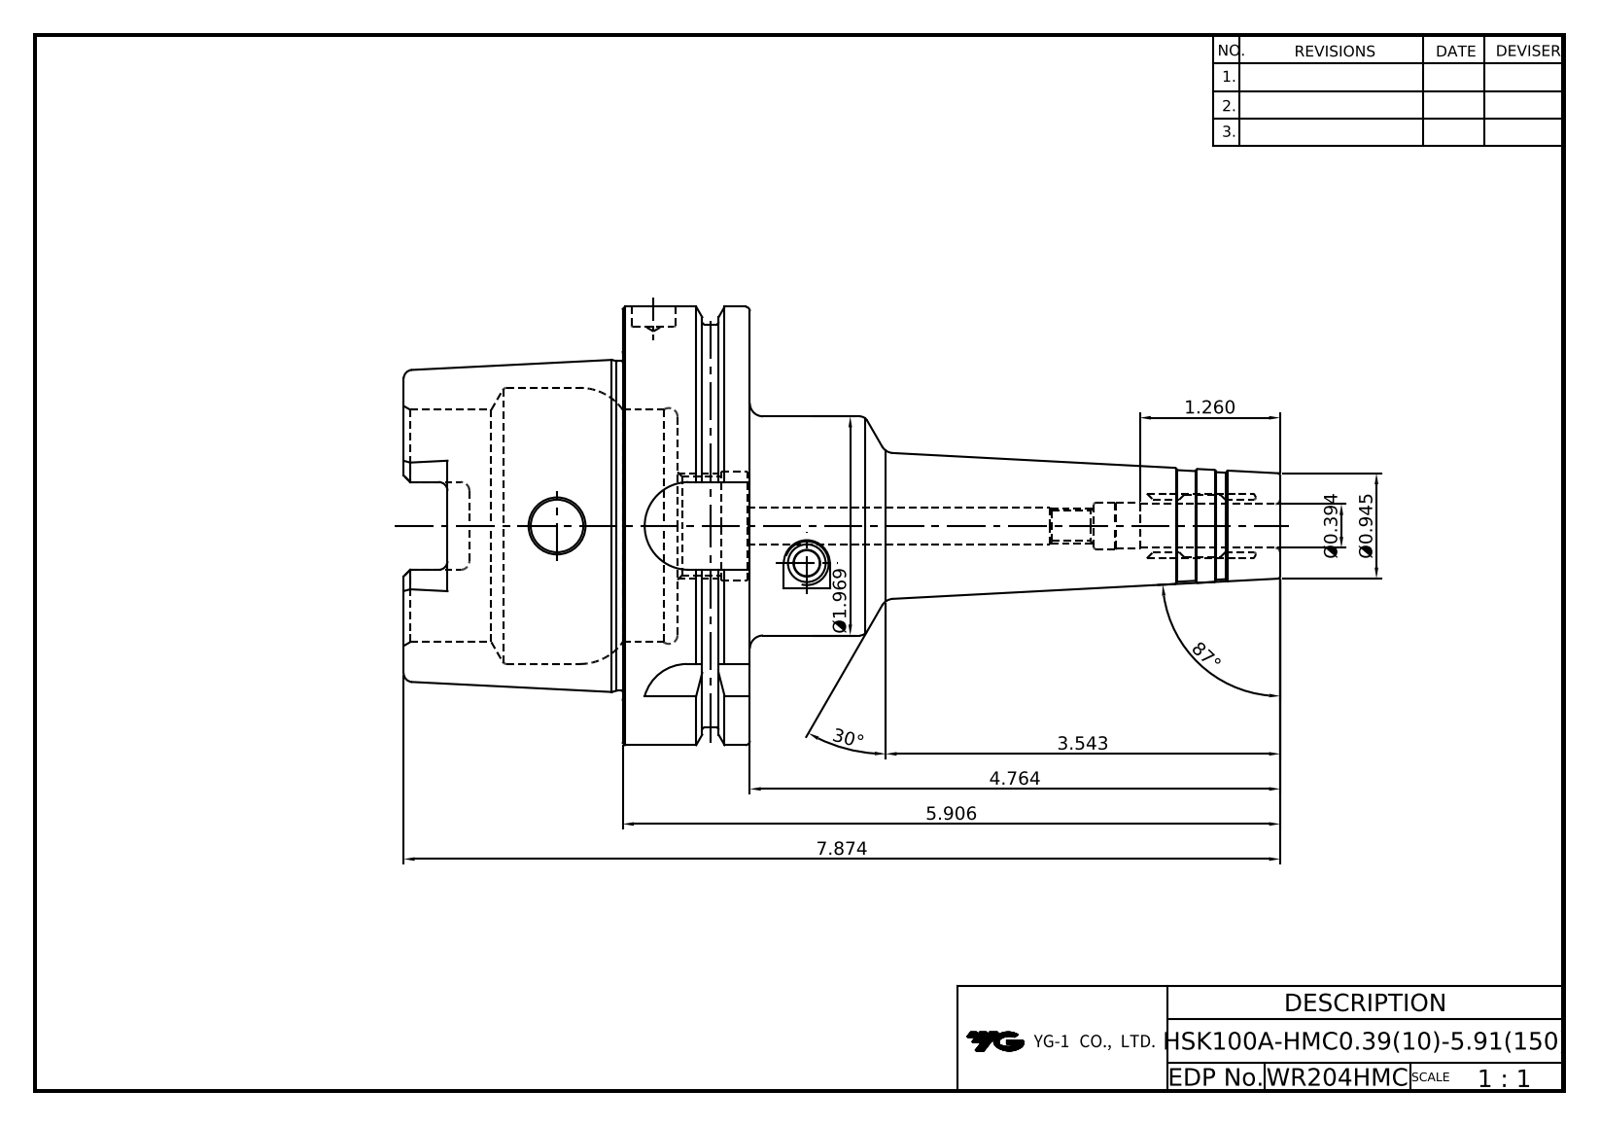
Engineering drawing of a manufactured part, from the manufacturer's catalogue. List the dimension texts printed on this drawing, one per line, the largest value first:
87°
30°
7.874
5.906
4.764
3.543
Ø1.969
1.260
Ø0.945
Ø0.394
